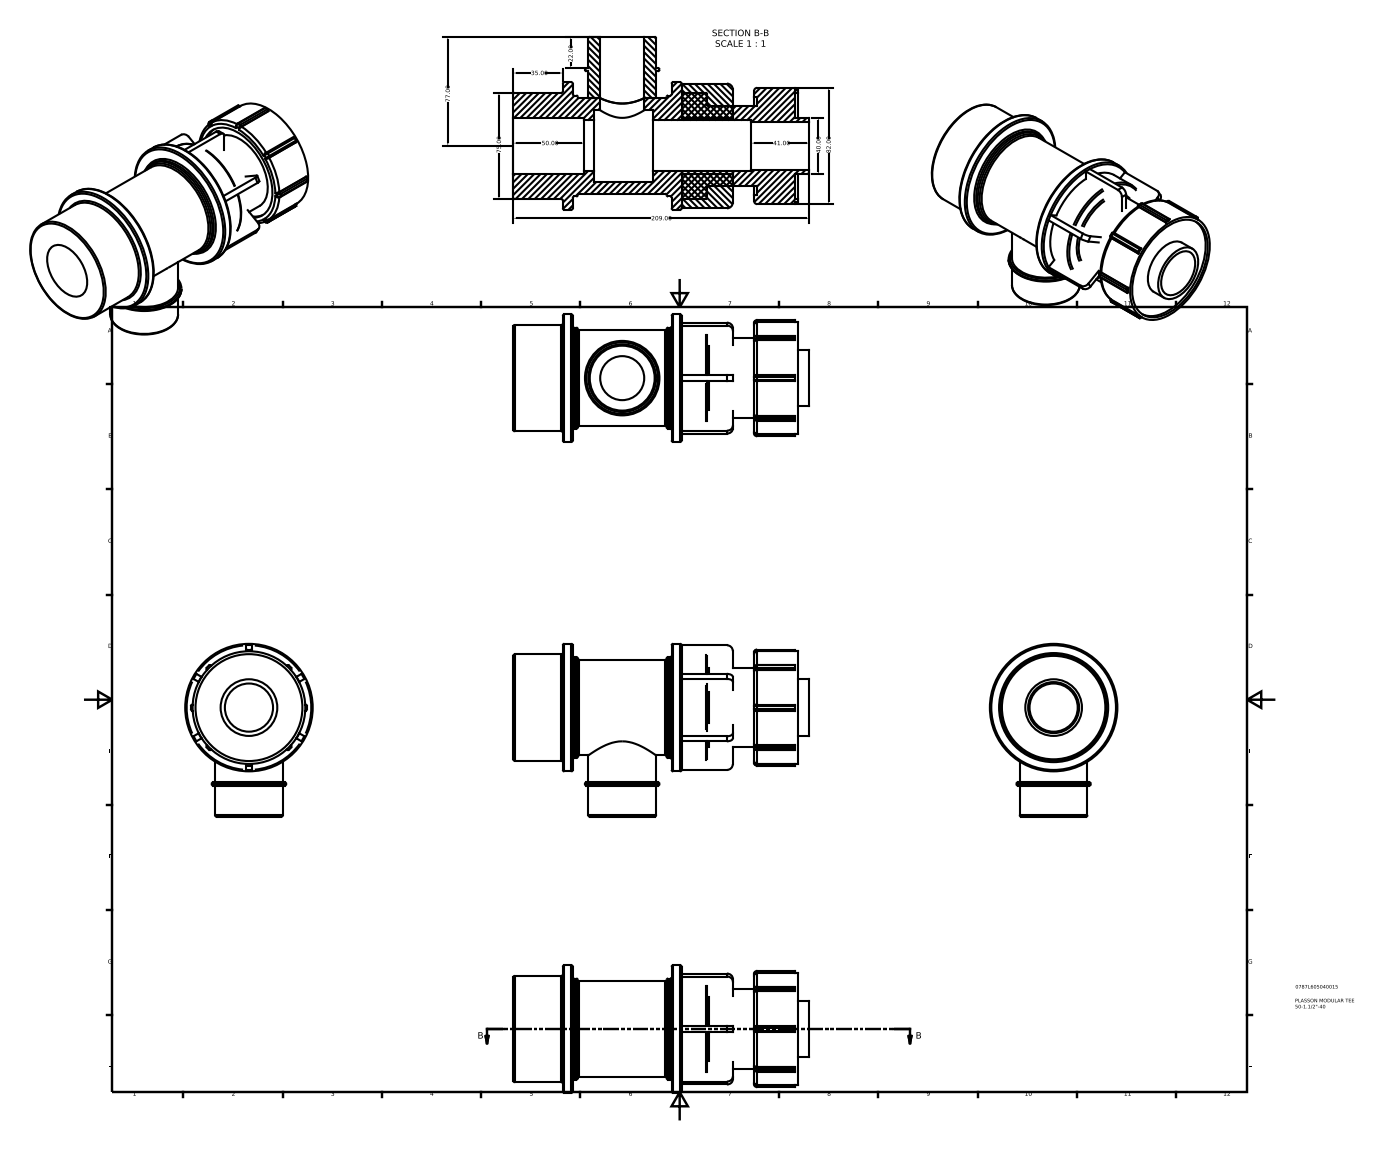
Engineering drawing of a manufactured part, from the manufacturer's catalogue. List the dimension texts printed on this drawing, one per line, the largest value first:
209.00
82.00
77.00
75.00
50.00
41.00
40.00
35.00
22.00
